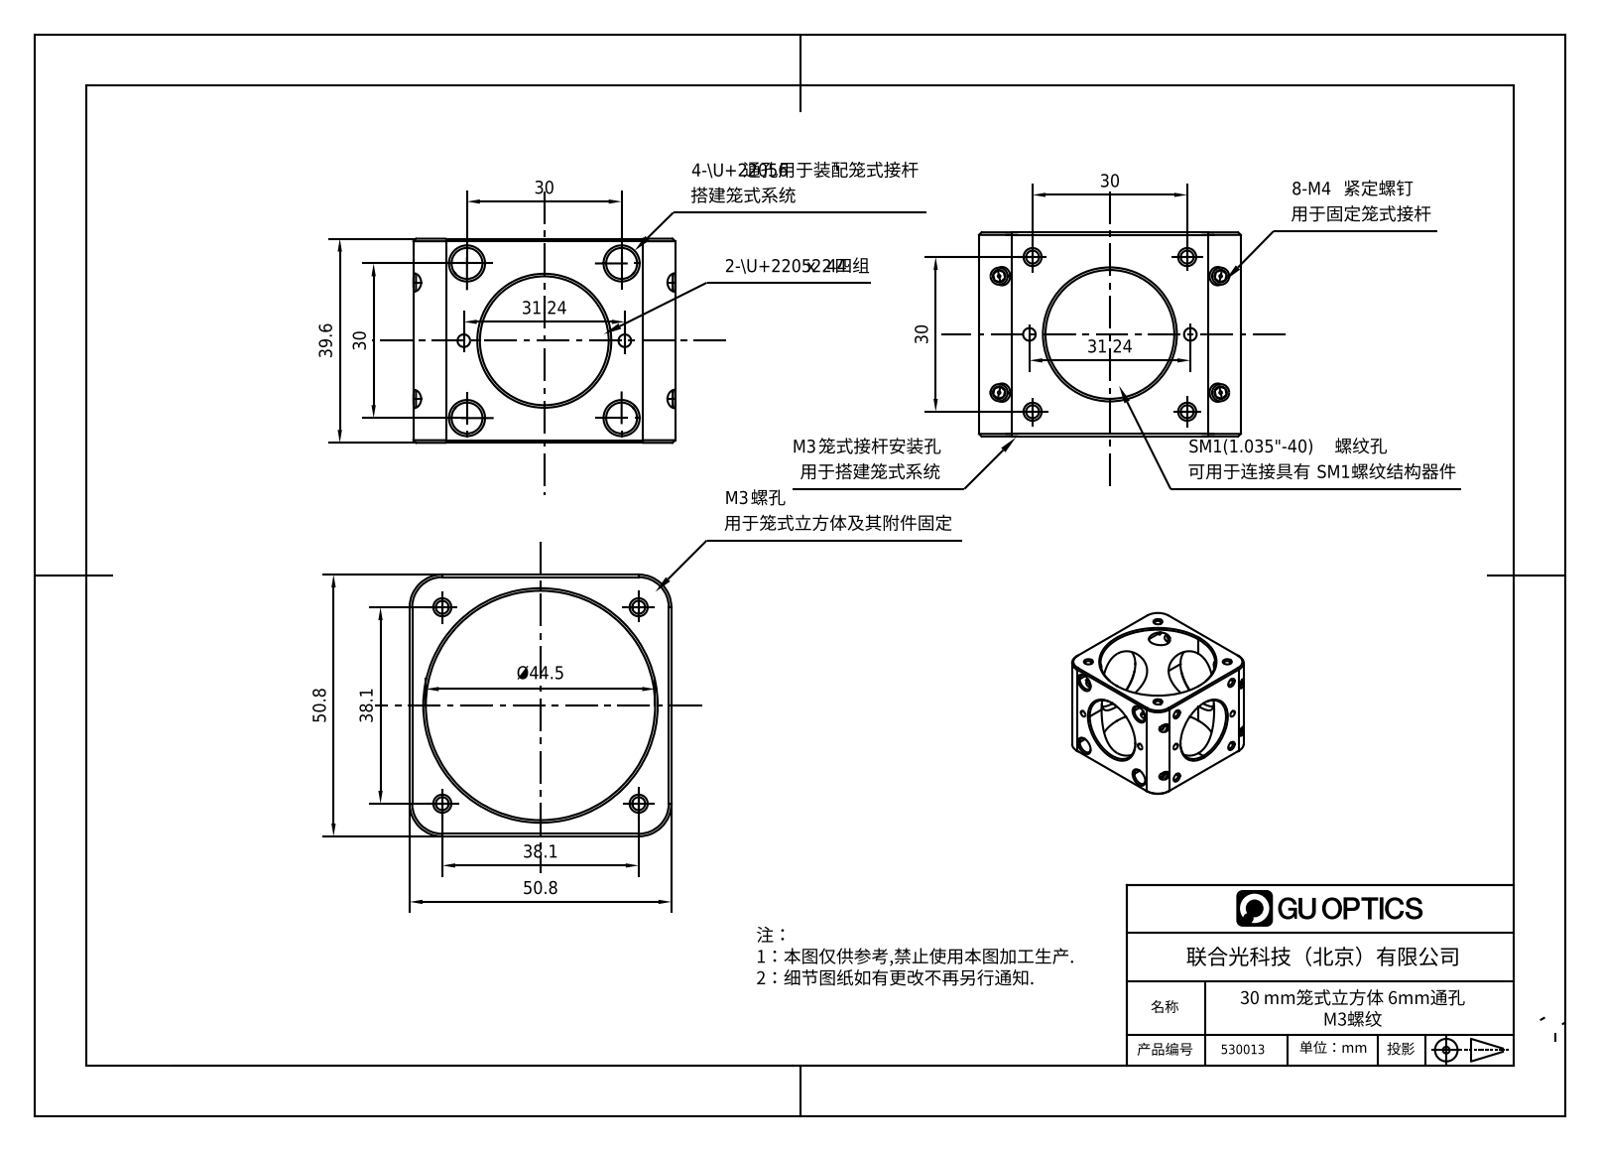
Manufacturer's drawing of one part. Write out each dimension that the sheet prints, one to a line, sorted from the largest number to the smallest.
50.8
50.8
Ø44.5
39.6
38.1
38.1
31.24
31.24
30
30
30
30
